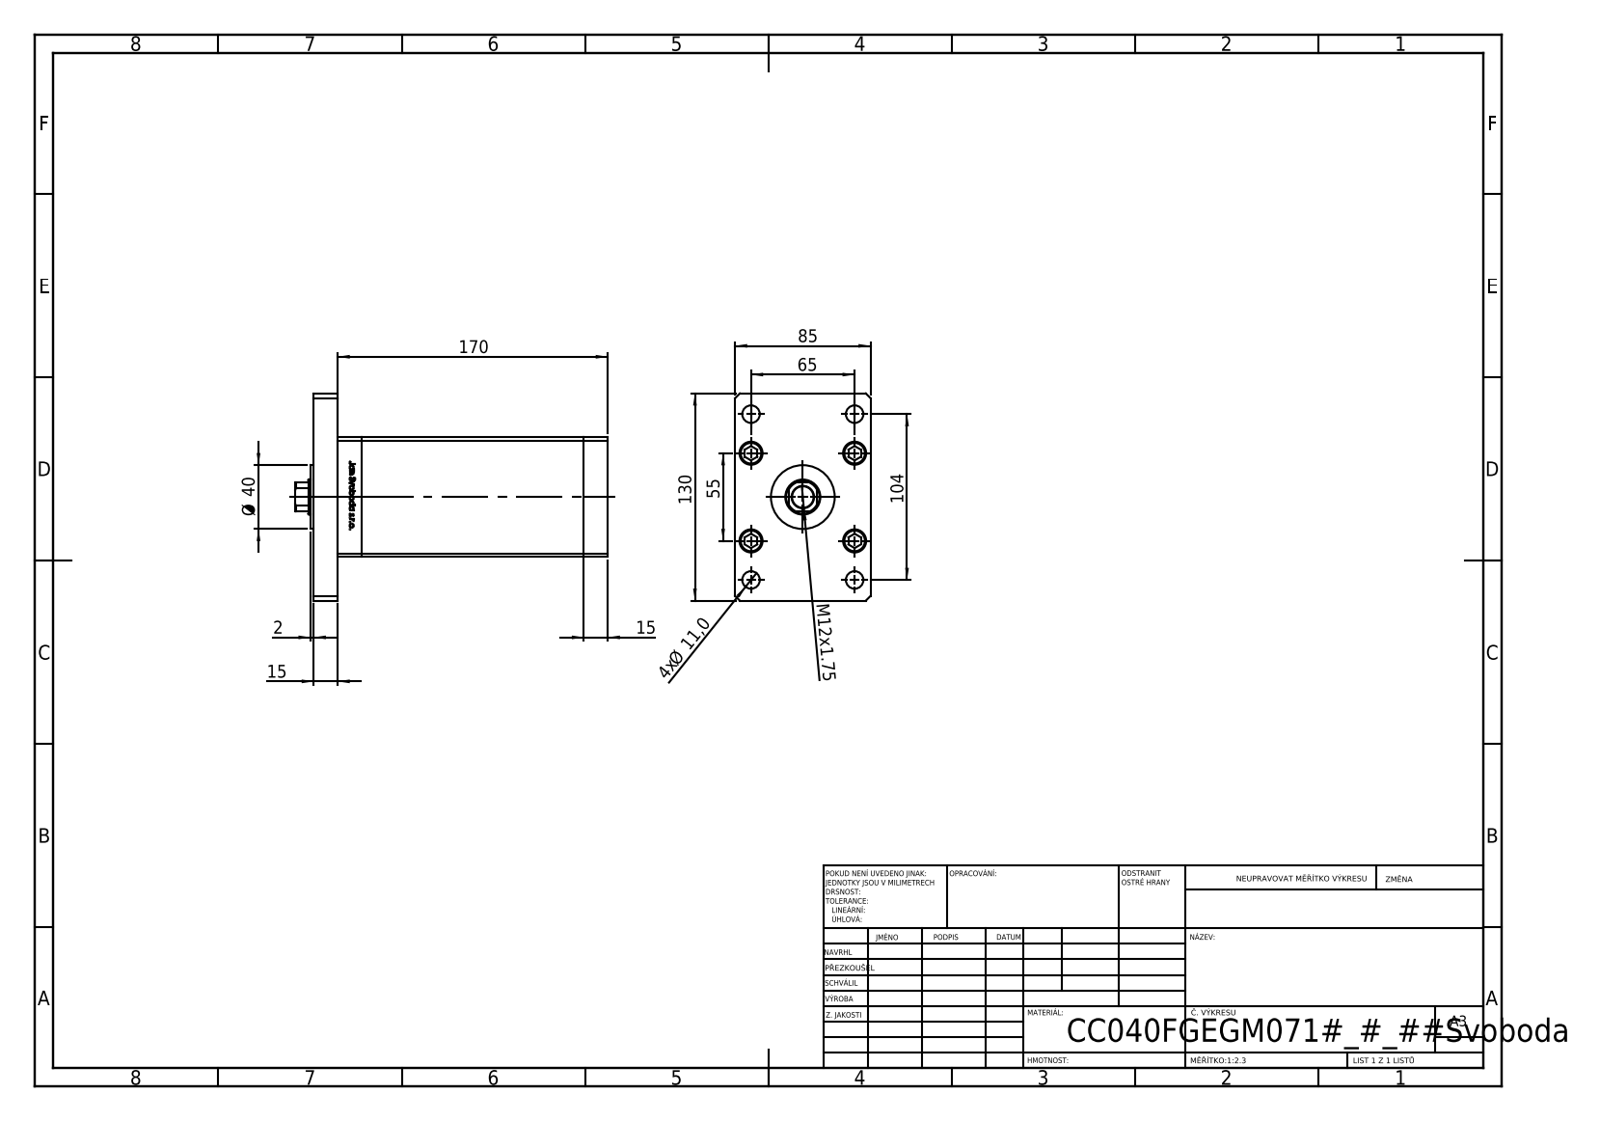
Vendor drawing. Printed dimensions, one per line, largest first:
170
130
104
85
65
55
Ø 40
15
15
M12x1.75
4x Ø 11,0
2
